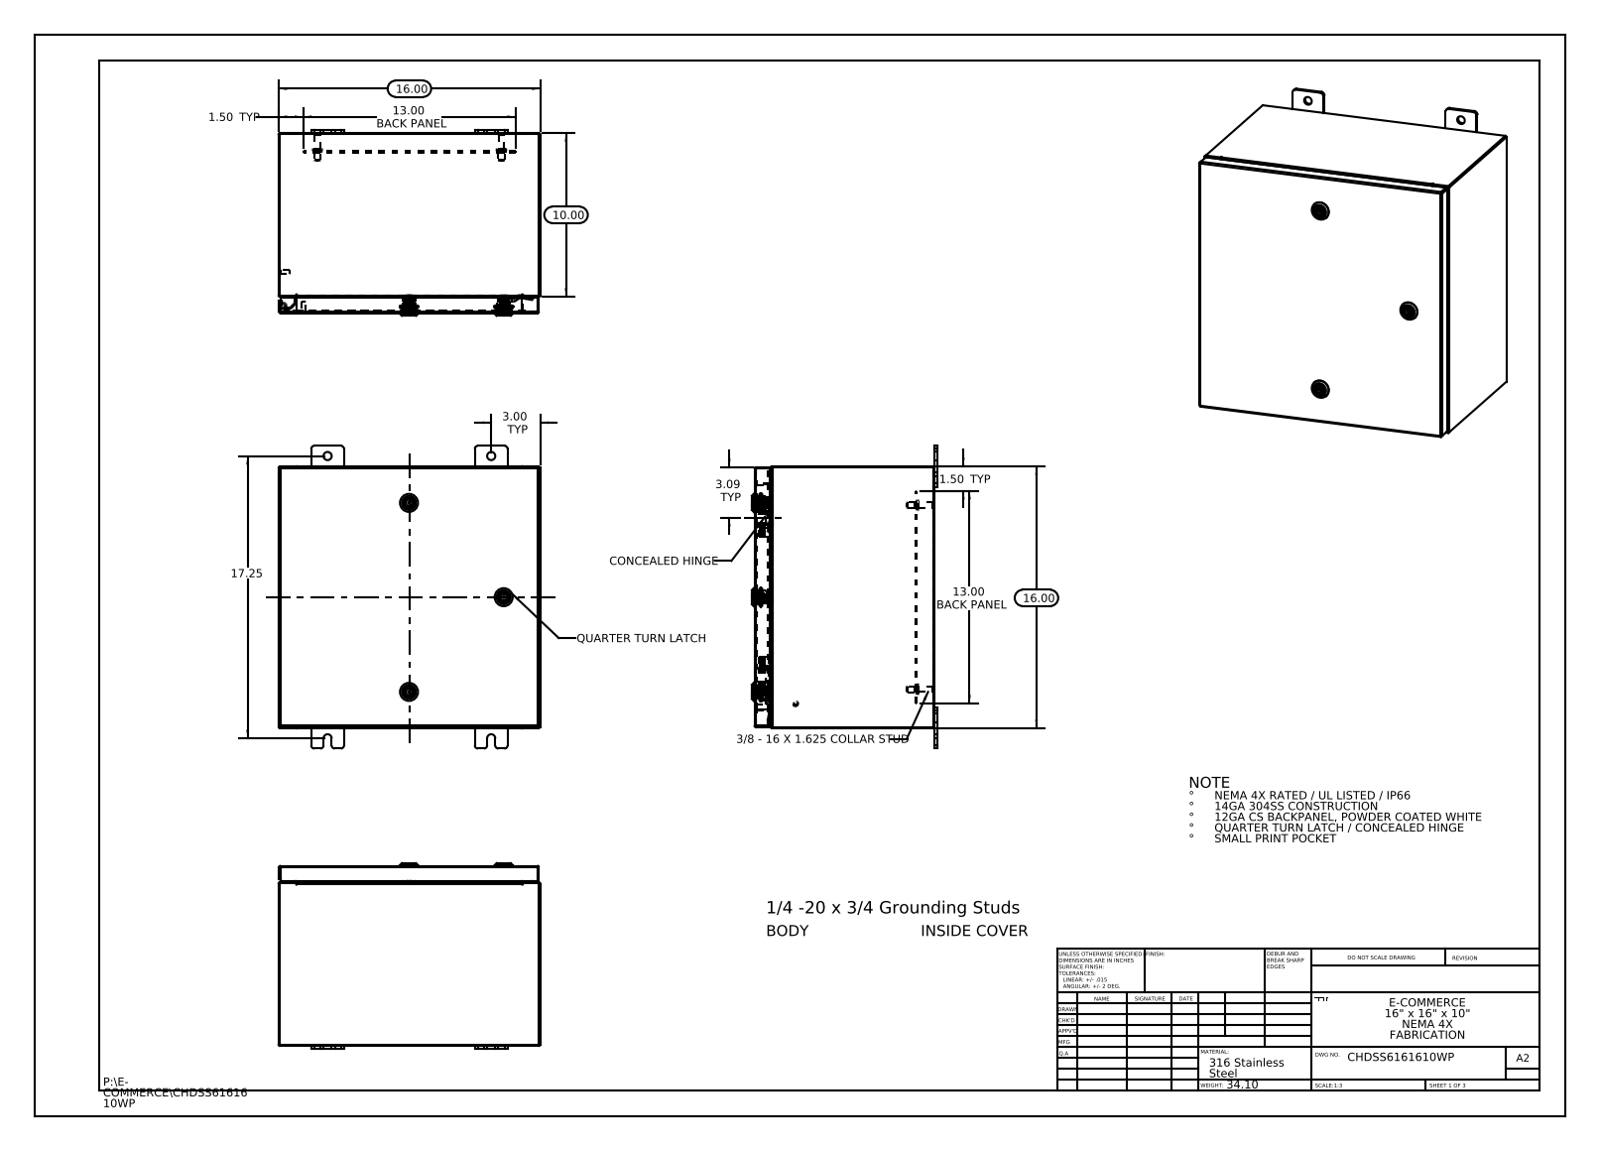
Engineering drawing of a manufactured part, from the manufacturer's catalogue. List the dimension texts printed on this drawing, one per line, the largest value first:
17.25
16.00
16.00
13.00 BACK PANEL
13.00 BACK PANEL
10.00
3.09 TYP
3.00 TYP
1.50 TYP
1.50 TYP
